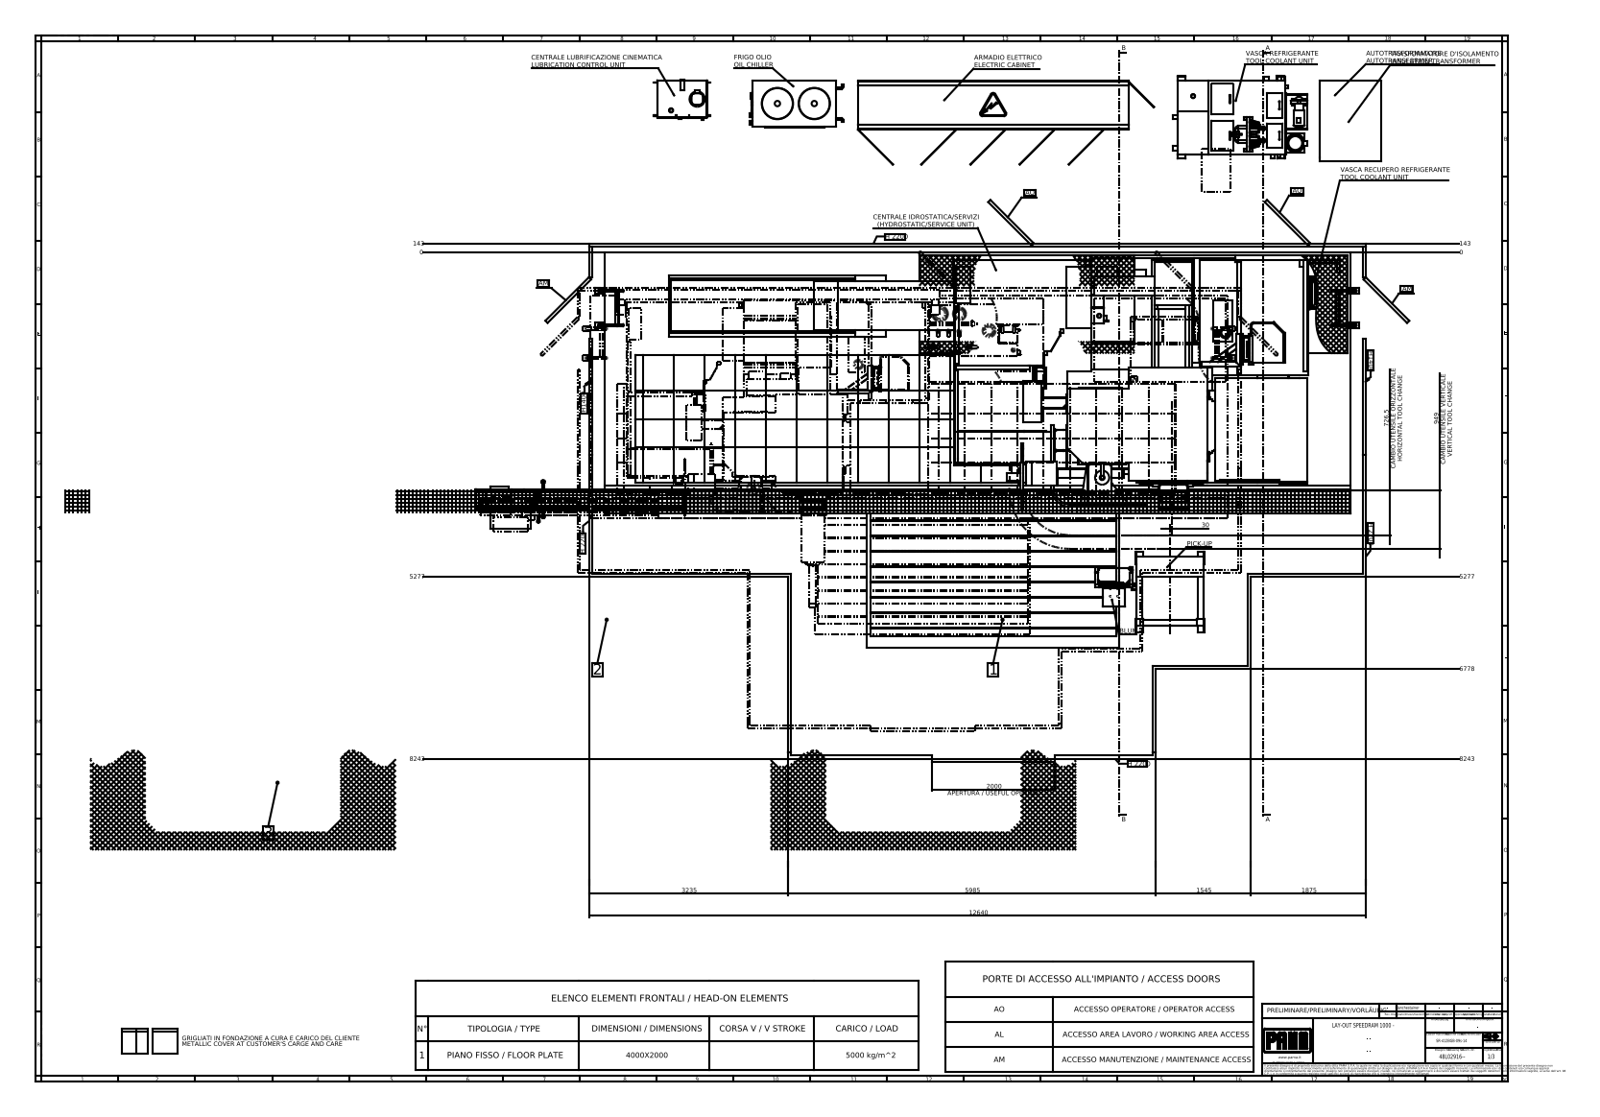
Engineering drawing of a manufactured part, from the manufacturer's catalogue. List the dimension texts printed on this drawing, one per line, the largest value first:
12640
8243
8243
6778
5985
5277
5277
3235
2000 APERTURA / USEFUL OPENING
1875
1545
949 CAMBIO UTENSILE VERTICALE VERTICAL TOOL CHANGE
726,5 CAMBIO UTENSILE ORIZZONTALE HORIZONTAL TOOL CHANGE
143
143
30
0
0
